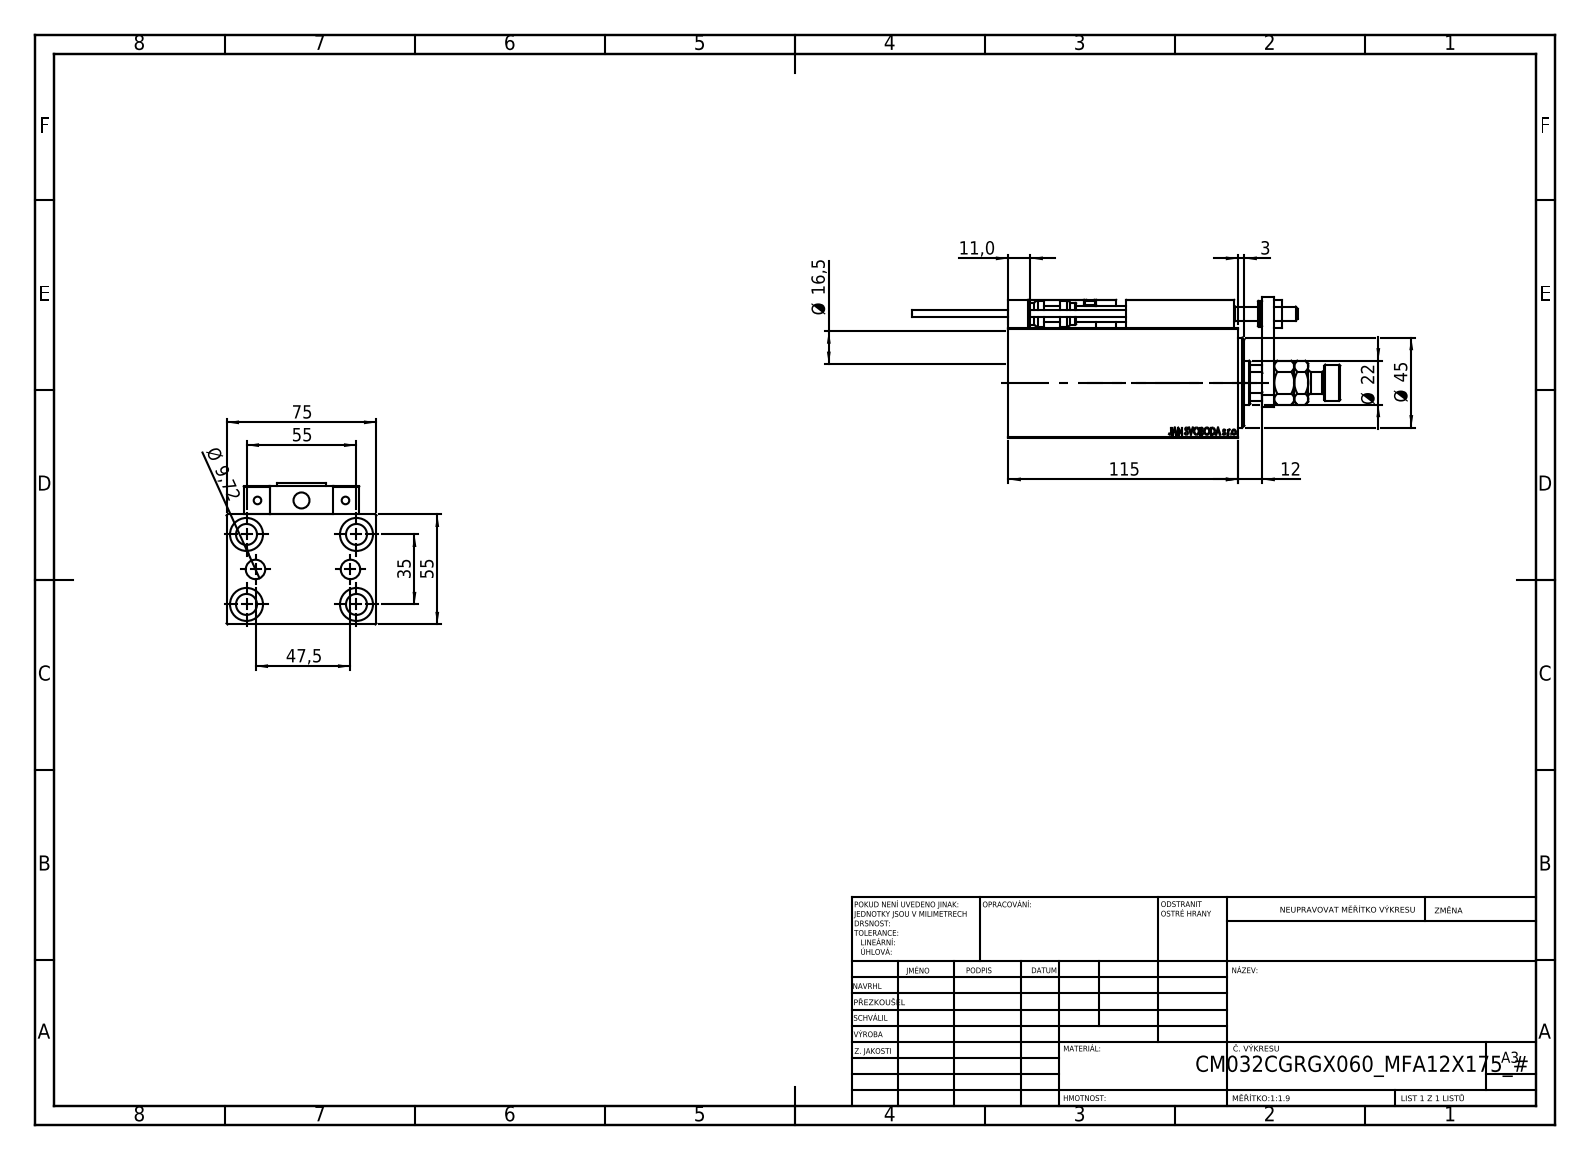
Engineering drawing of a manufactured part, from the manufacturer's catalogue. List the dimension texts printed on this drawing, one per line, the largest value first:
115
75
55
55
47,5
Ø 45
35
Ø 22
Ø 16,5
12
11,0
Ø 9,72
3
